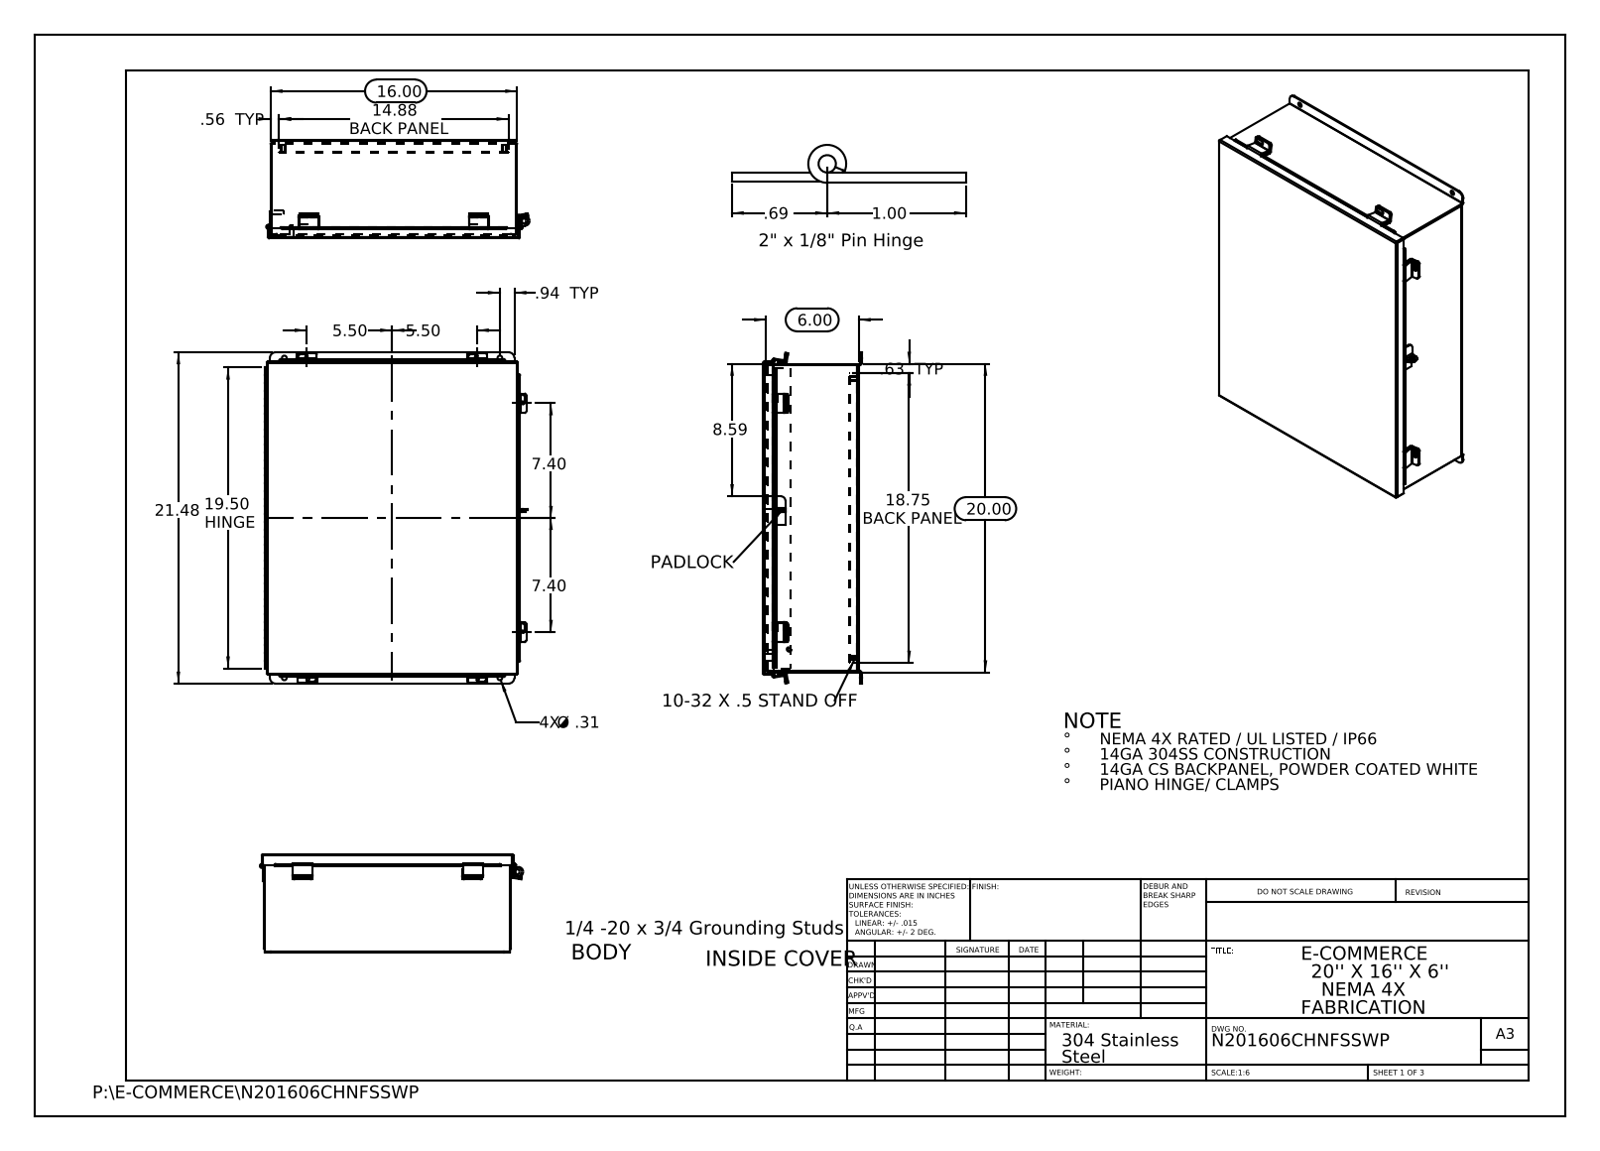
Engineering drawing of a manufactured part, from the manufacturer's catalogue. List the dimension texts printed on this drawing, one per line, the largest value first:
21.48
20.00
19.50 HINGE
18.75 BACK PANEL
16.00
14.88 BACK PANEL
8.59
7.40
7.40
6.00
5.50
5.50
1.00
.94 TYP
.69
.63 TYP
.56 TYP
4X Ø .31
